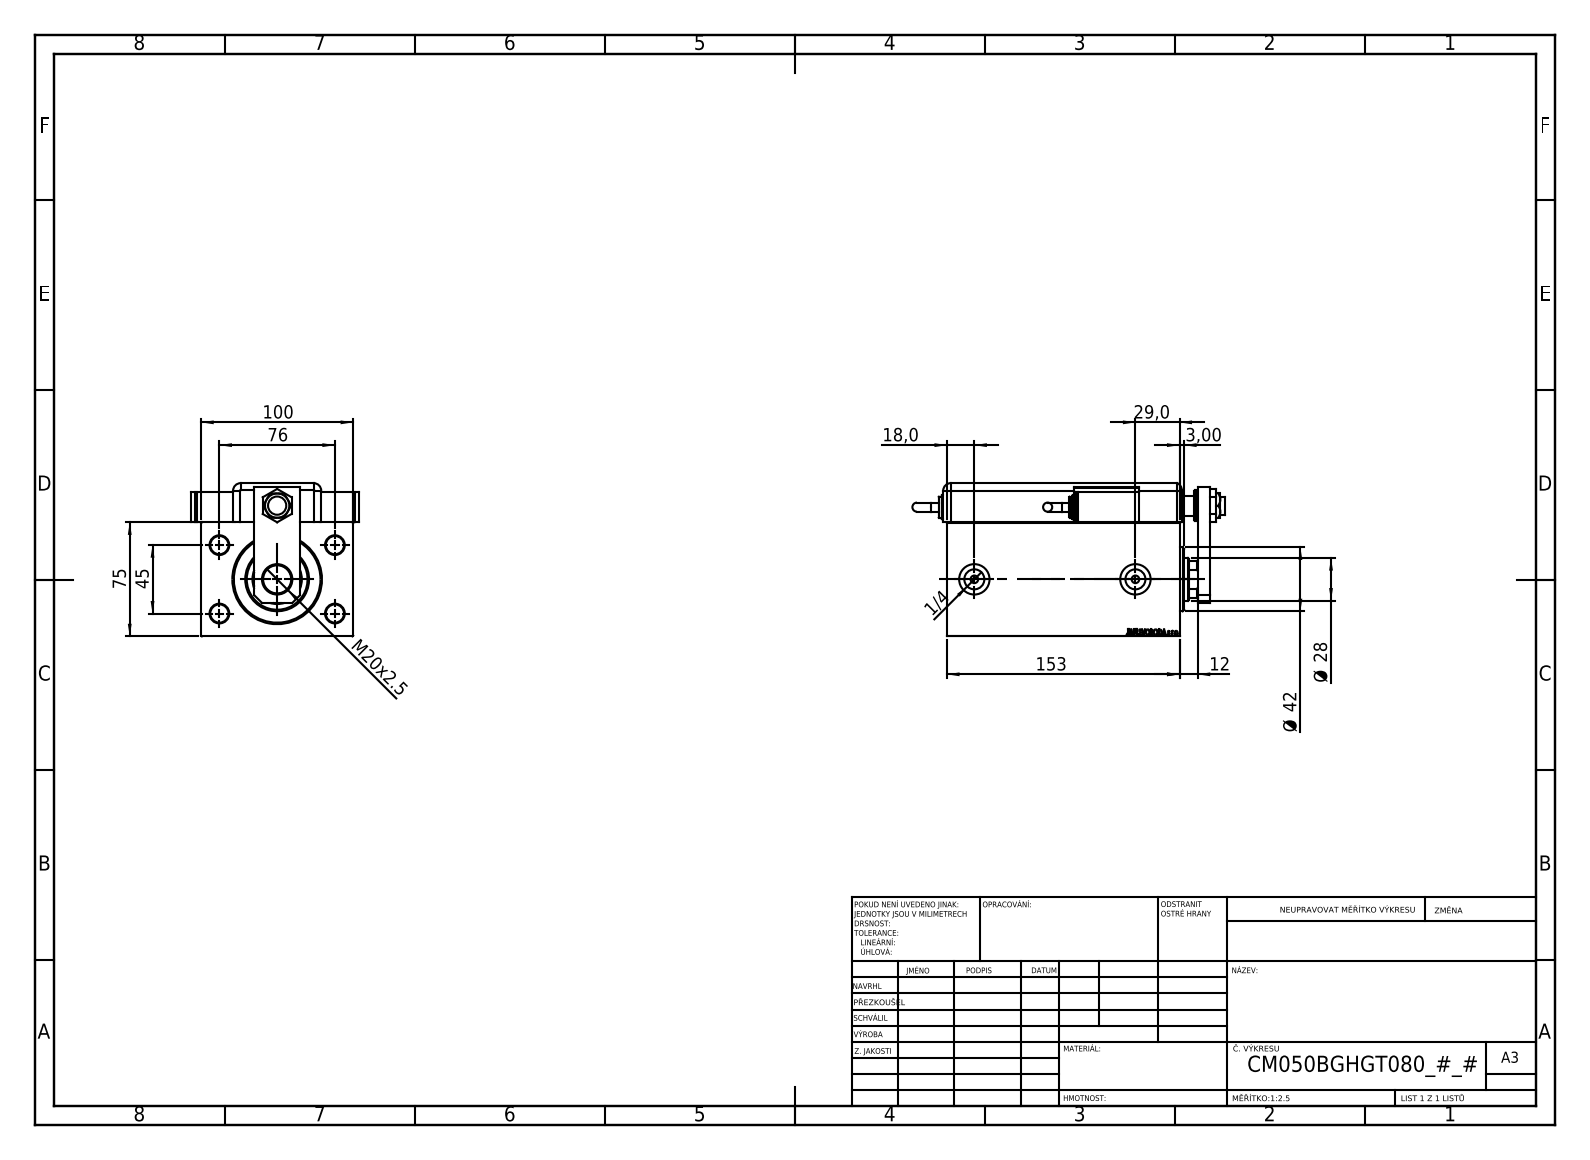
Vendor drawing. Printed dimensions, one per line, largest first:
153
100
76
75
45
Ø 42
29,0
Ø 28
M20x2.5
18,0
12
3,00
1/4
